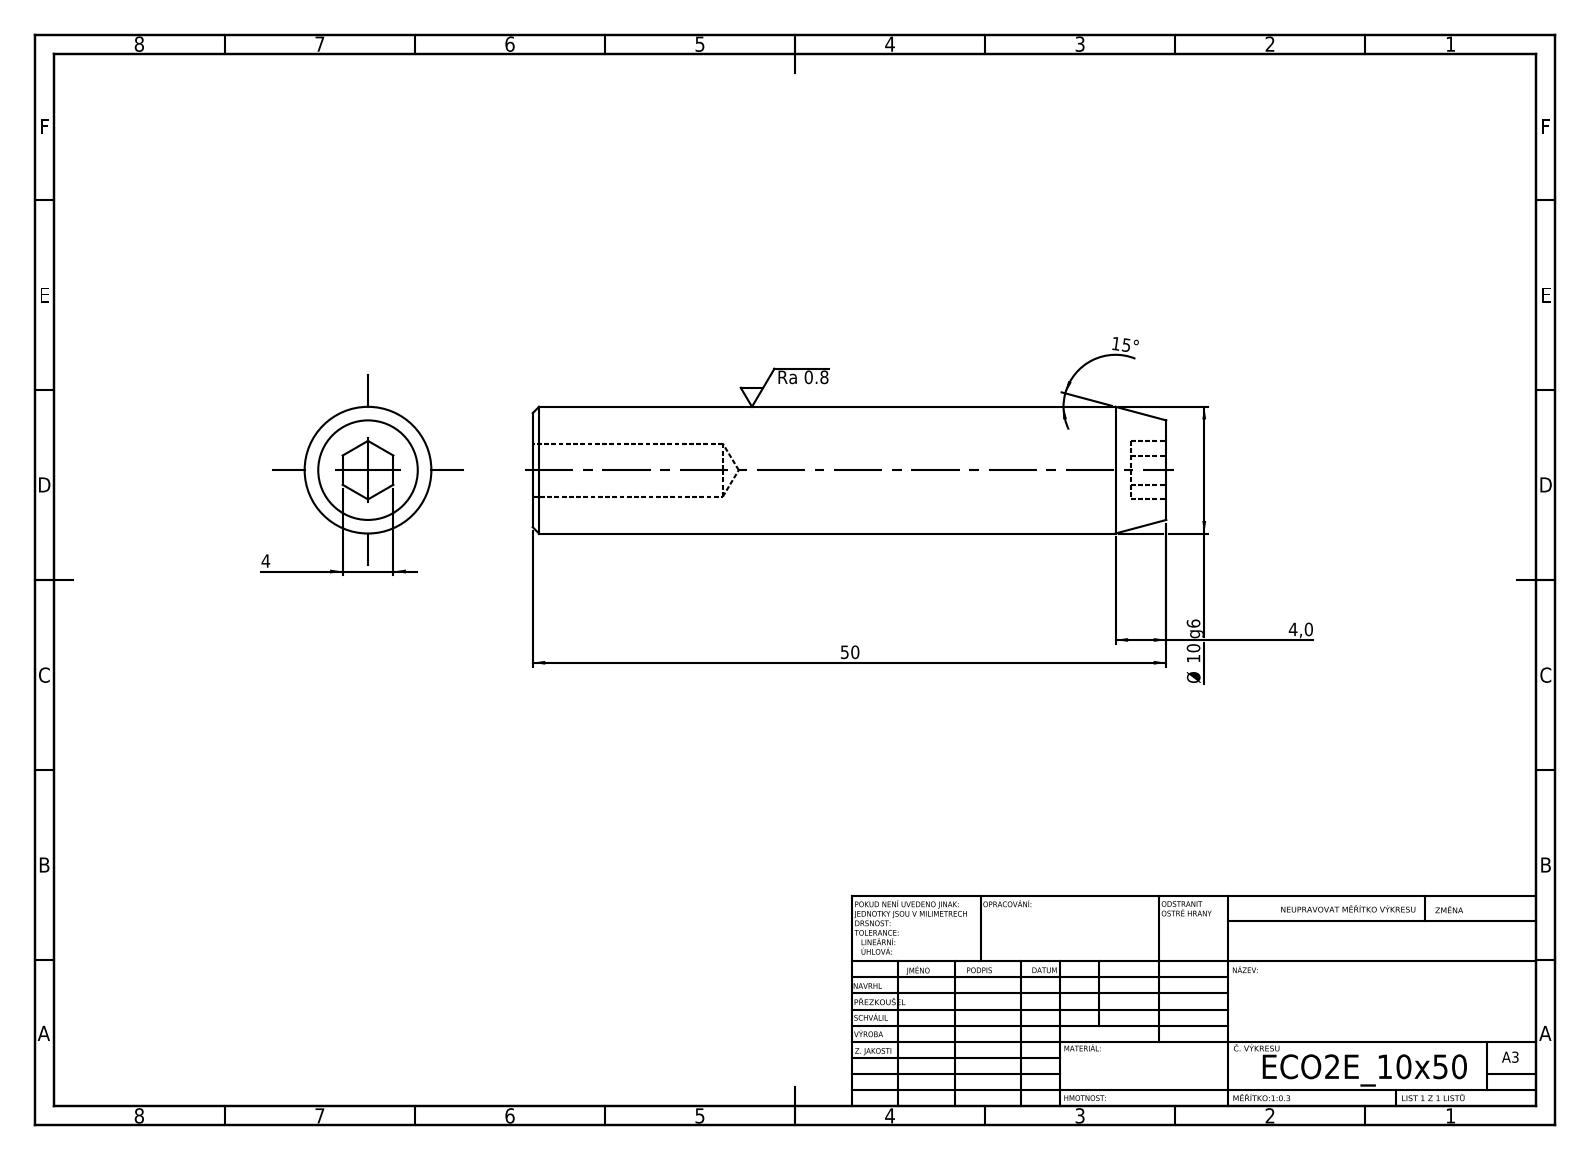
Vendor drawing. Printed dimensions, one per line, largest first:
50
15°
Ø 10 g6
4,0
4
